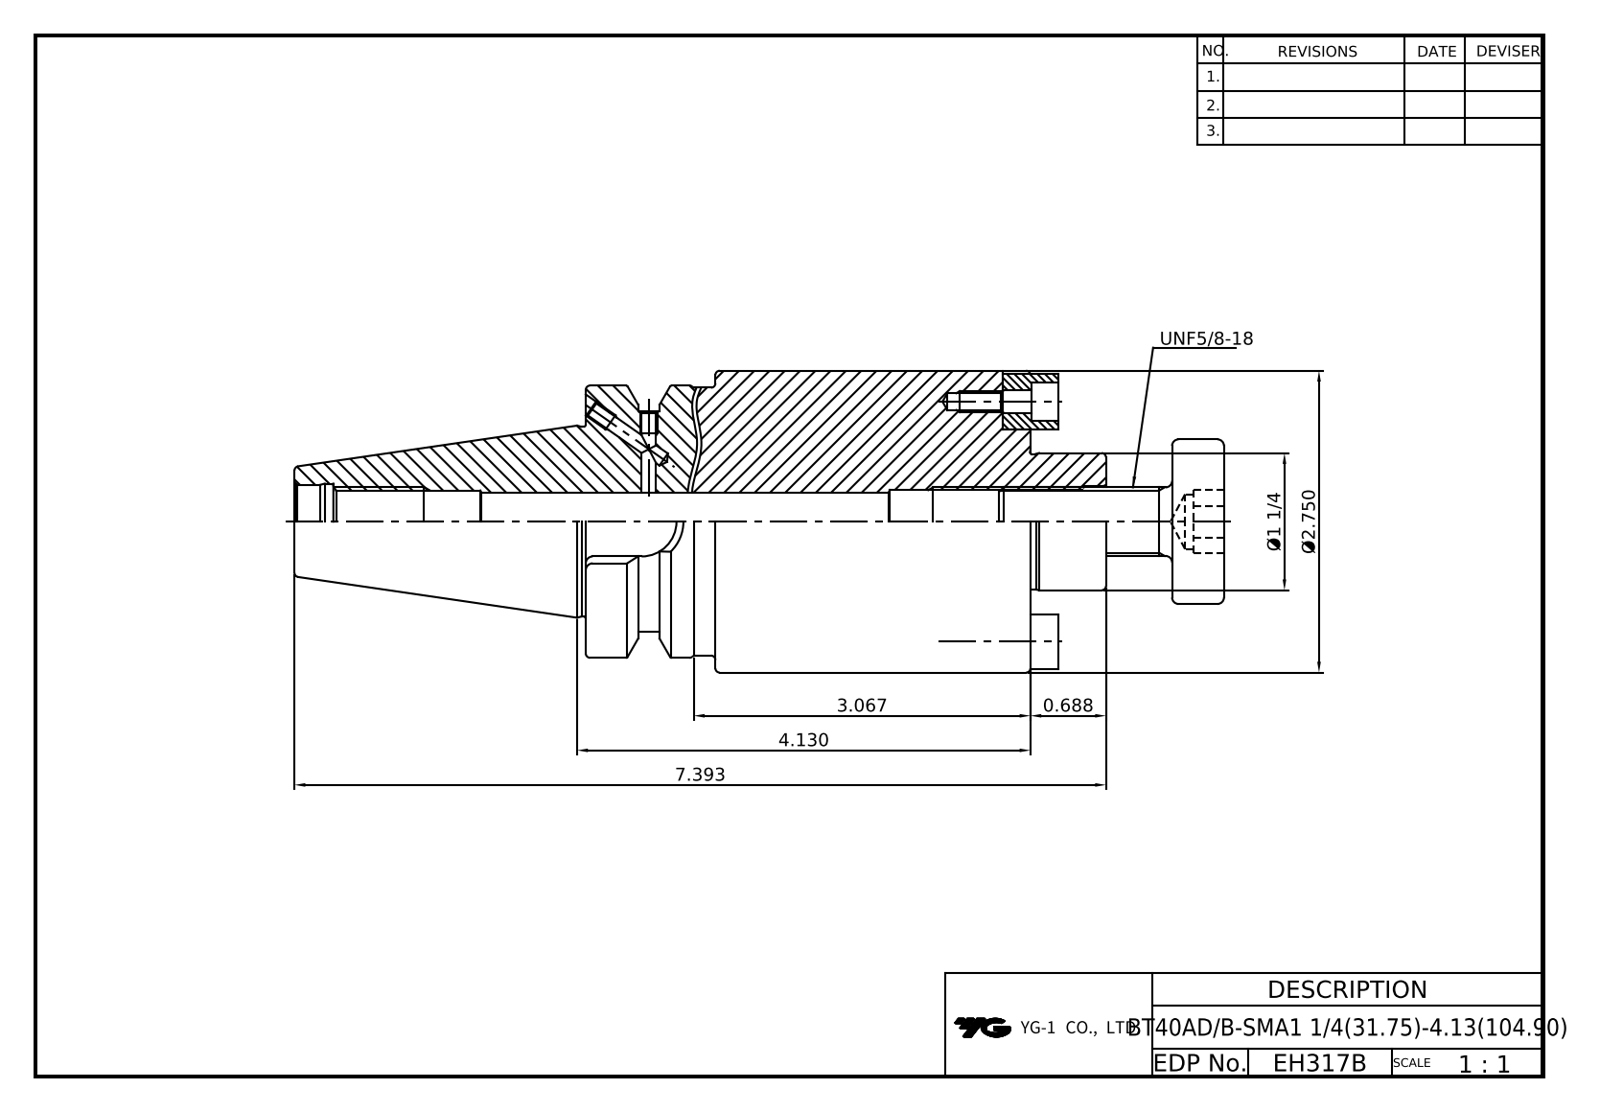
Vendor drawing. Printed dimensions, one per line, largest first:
7.393
4.130
3.067
Ø2.750
Ø1 1/4
0.688
